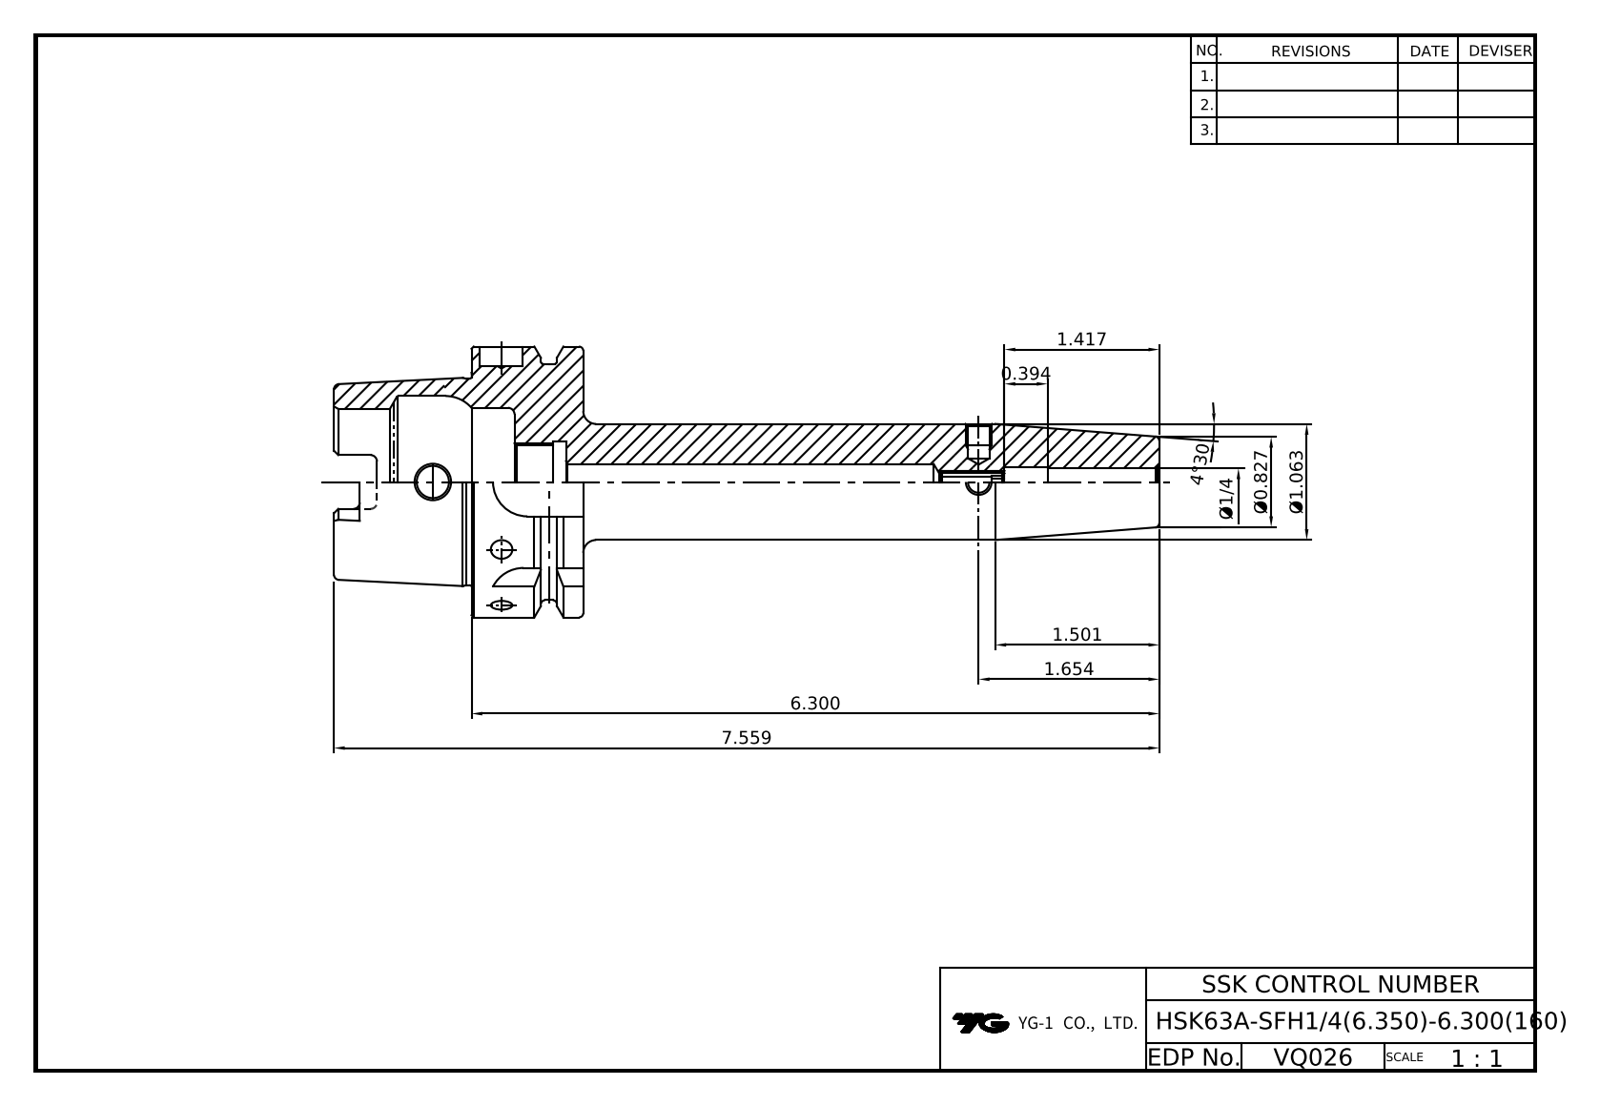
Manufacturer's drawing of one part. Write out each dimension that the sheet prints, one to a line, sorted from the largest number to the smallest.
7.559
6.300
4°30'
1.654
1.501
1.417
Ø1.063
Ø0.827
0.394
